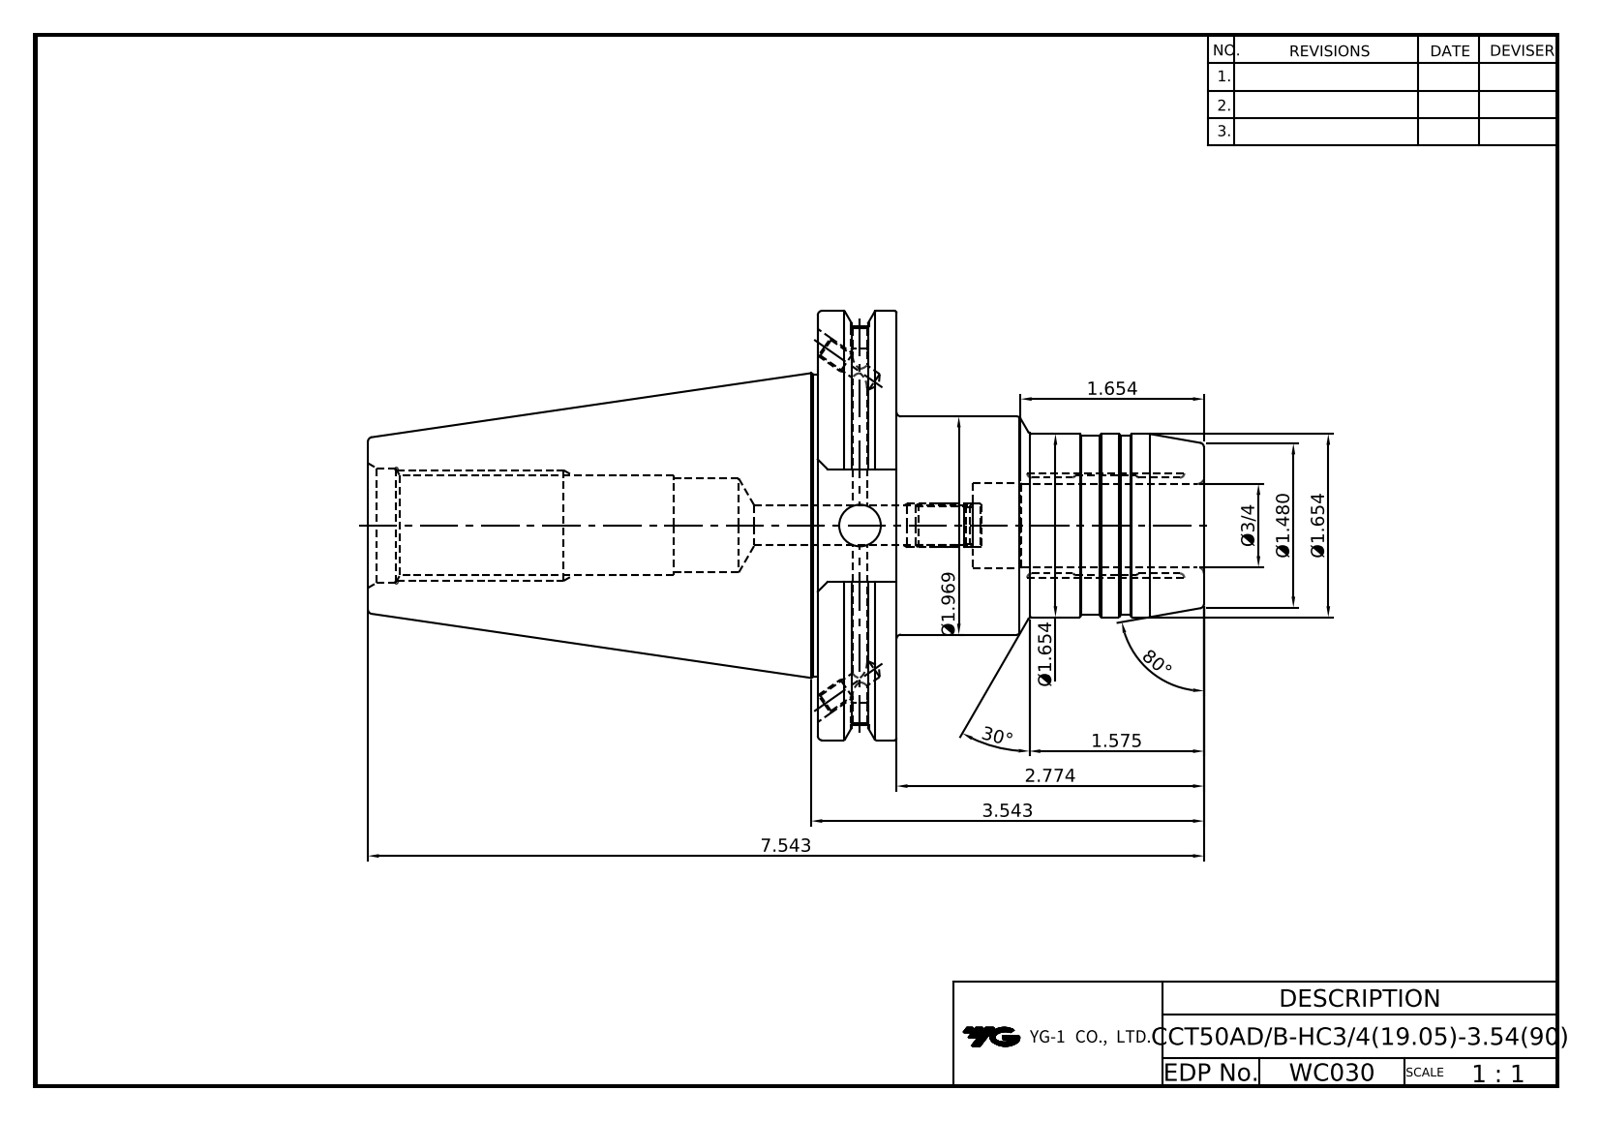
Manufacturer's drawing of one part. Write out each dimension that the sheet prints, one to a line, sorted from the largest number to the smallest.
80°
30°
7.543
3.543
2.774
Ø1.969
Ø1.654
Ø1.654
1.654
1.575
Ø1.480
Ø3/4
